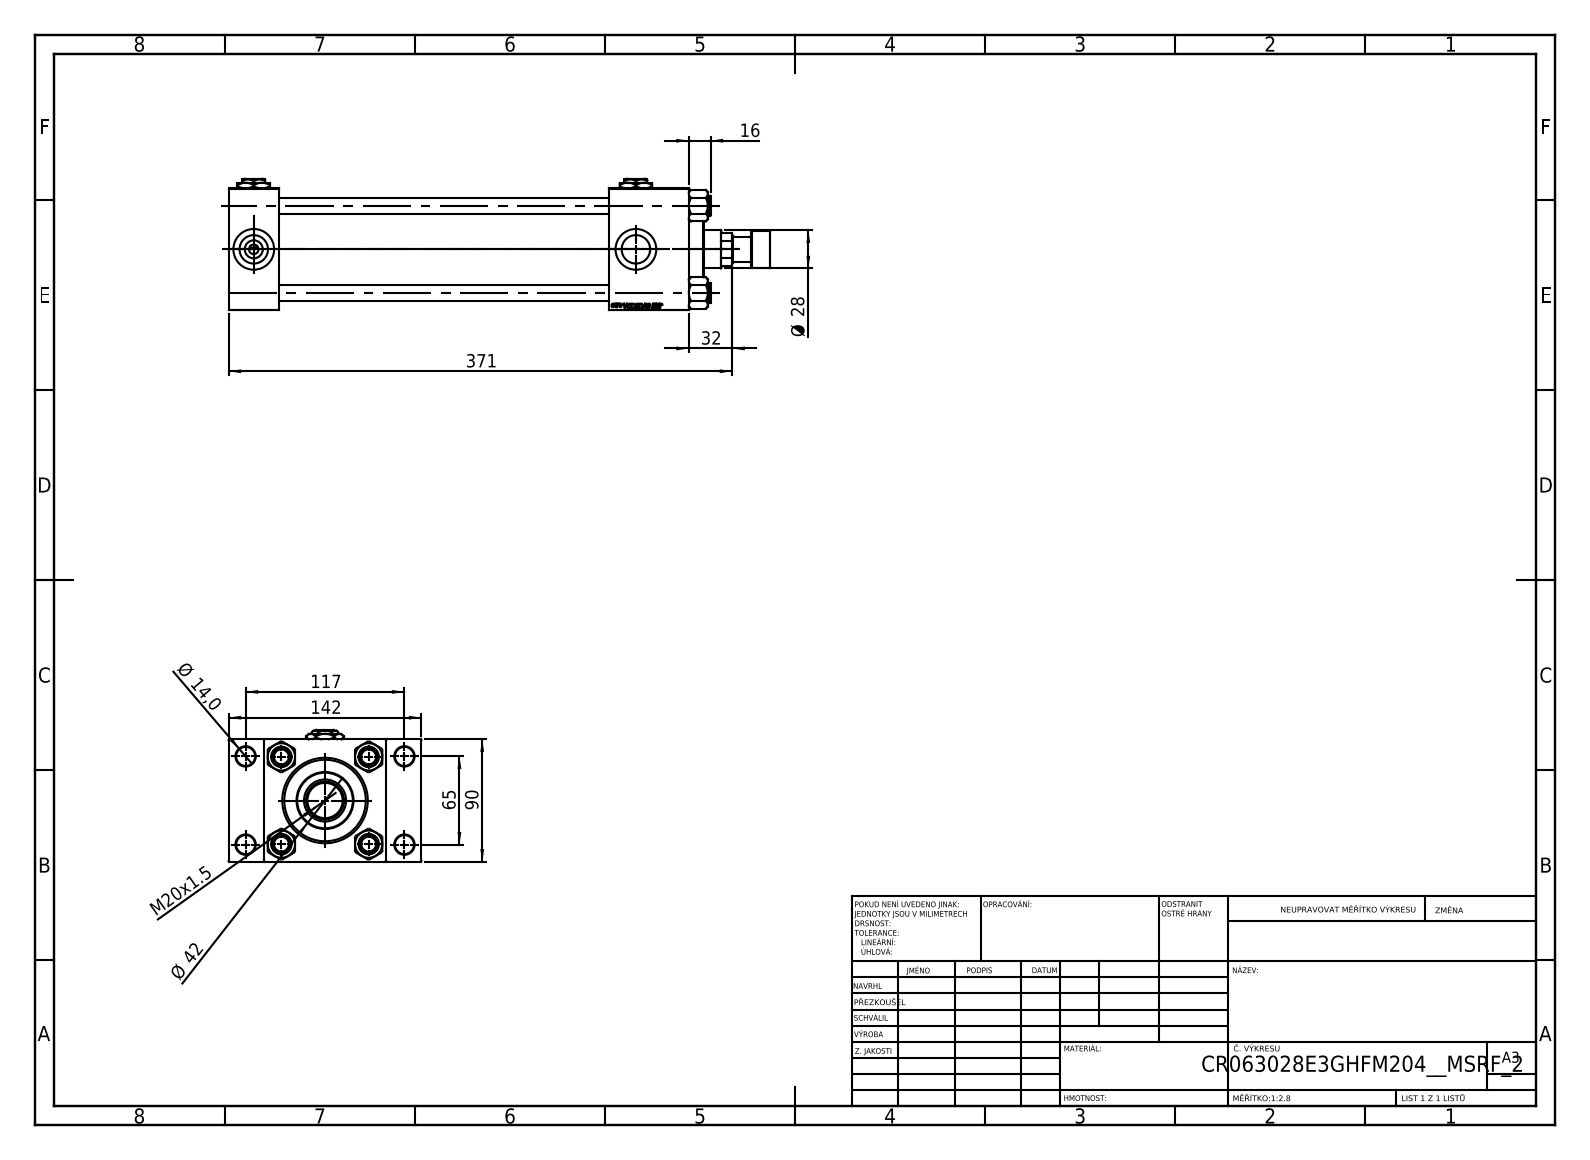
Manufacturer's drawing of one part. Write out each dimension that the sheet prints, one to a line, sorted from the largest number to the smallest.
371
142
117
90
65
Ø 42
32
Ø 28
M20x1.5
16
Ø 14,0
